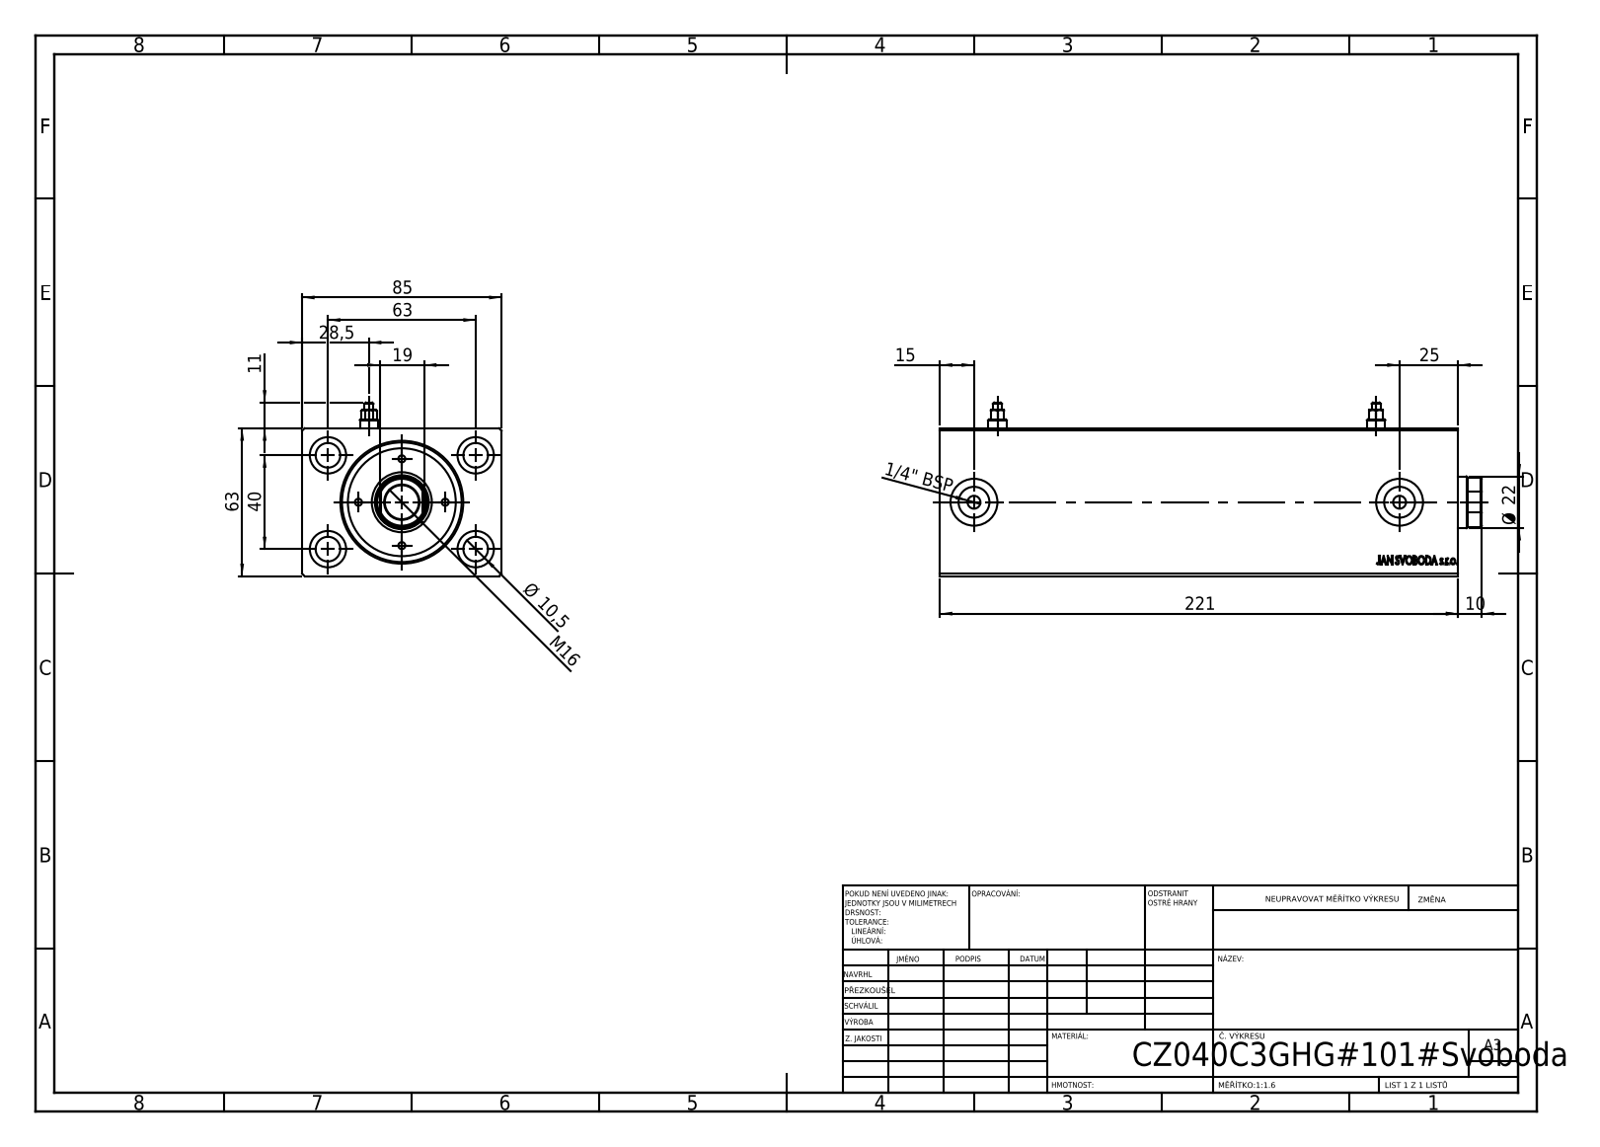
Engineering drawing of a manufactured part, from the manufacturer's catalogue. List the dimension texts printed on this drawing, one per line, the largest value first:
221
85
63
63
40
28,5
25
Ø 22
19
M16
15
11
Ø 10,5
10
1/4" BSP
